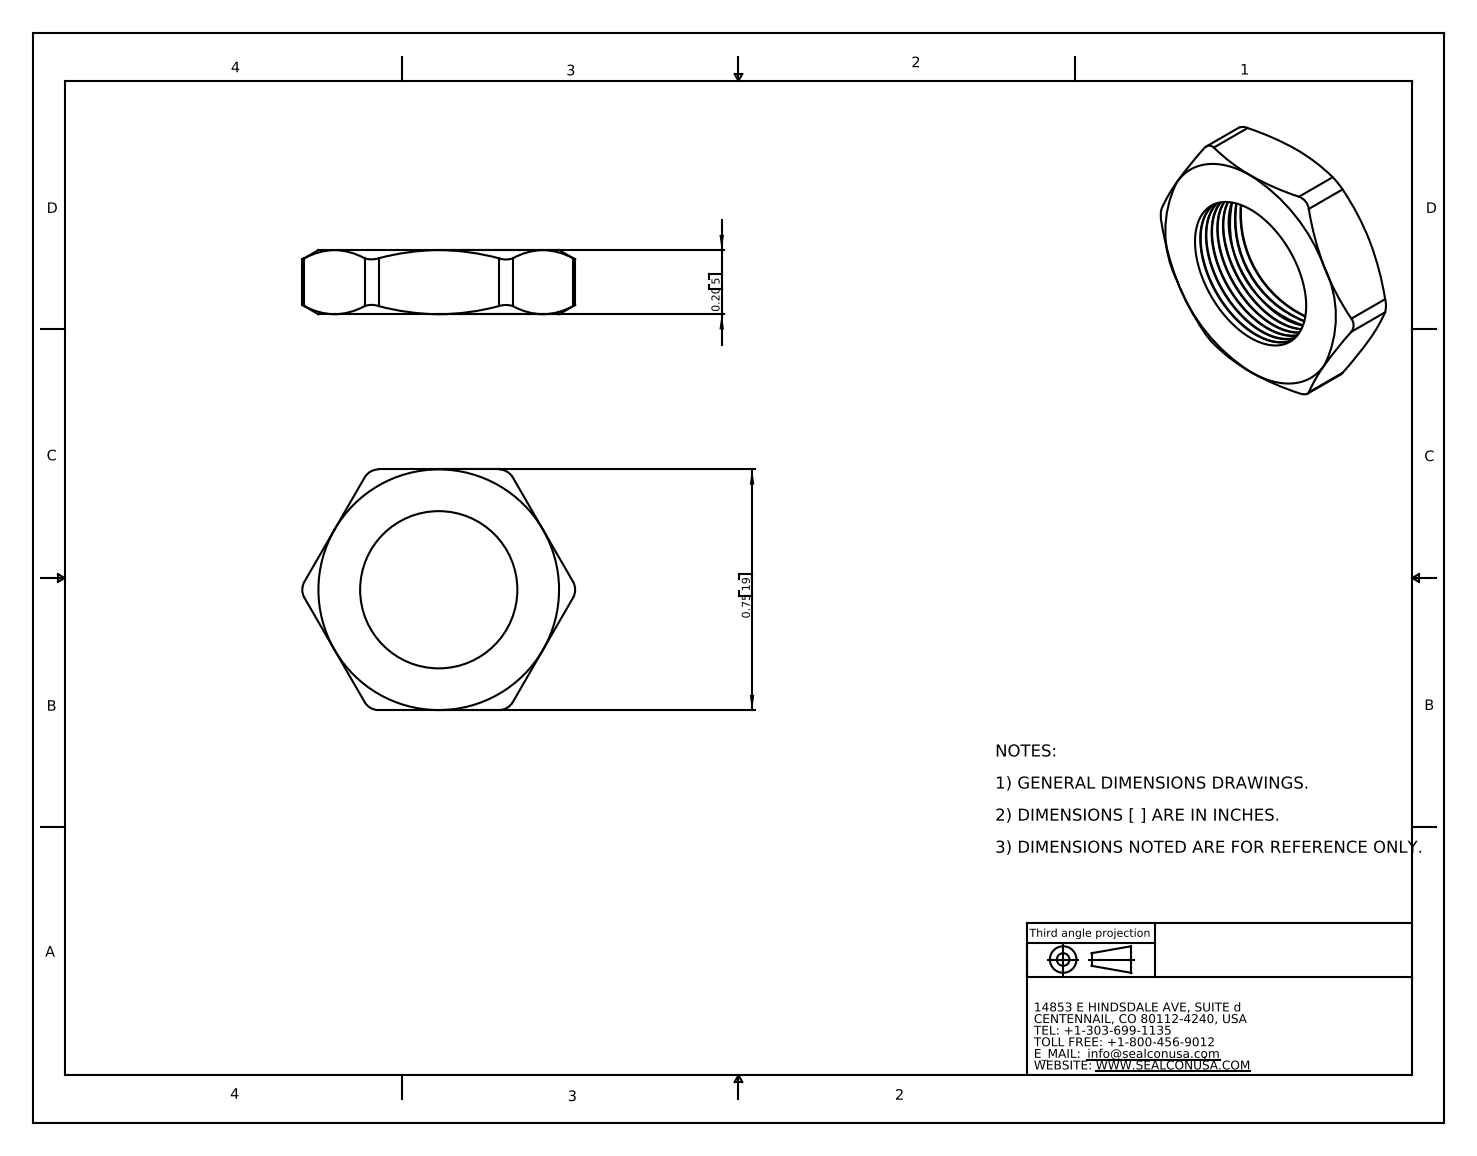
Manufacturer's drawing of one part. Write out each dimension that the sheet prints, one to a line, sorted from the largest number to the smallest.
0.75 19
0.20 5
